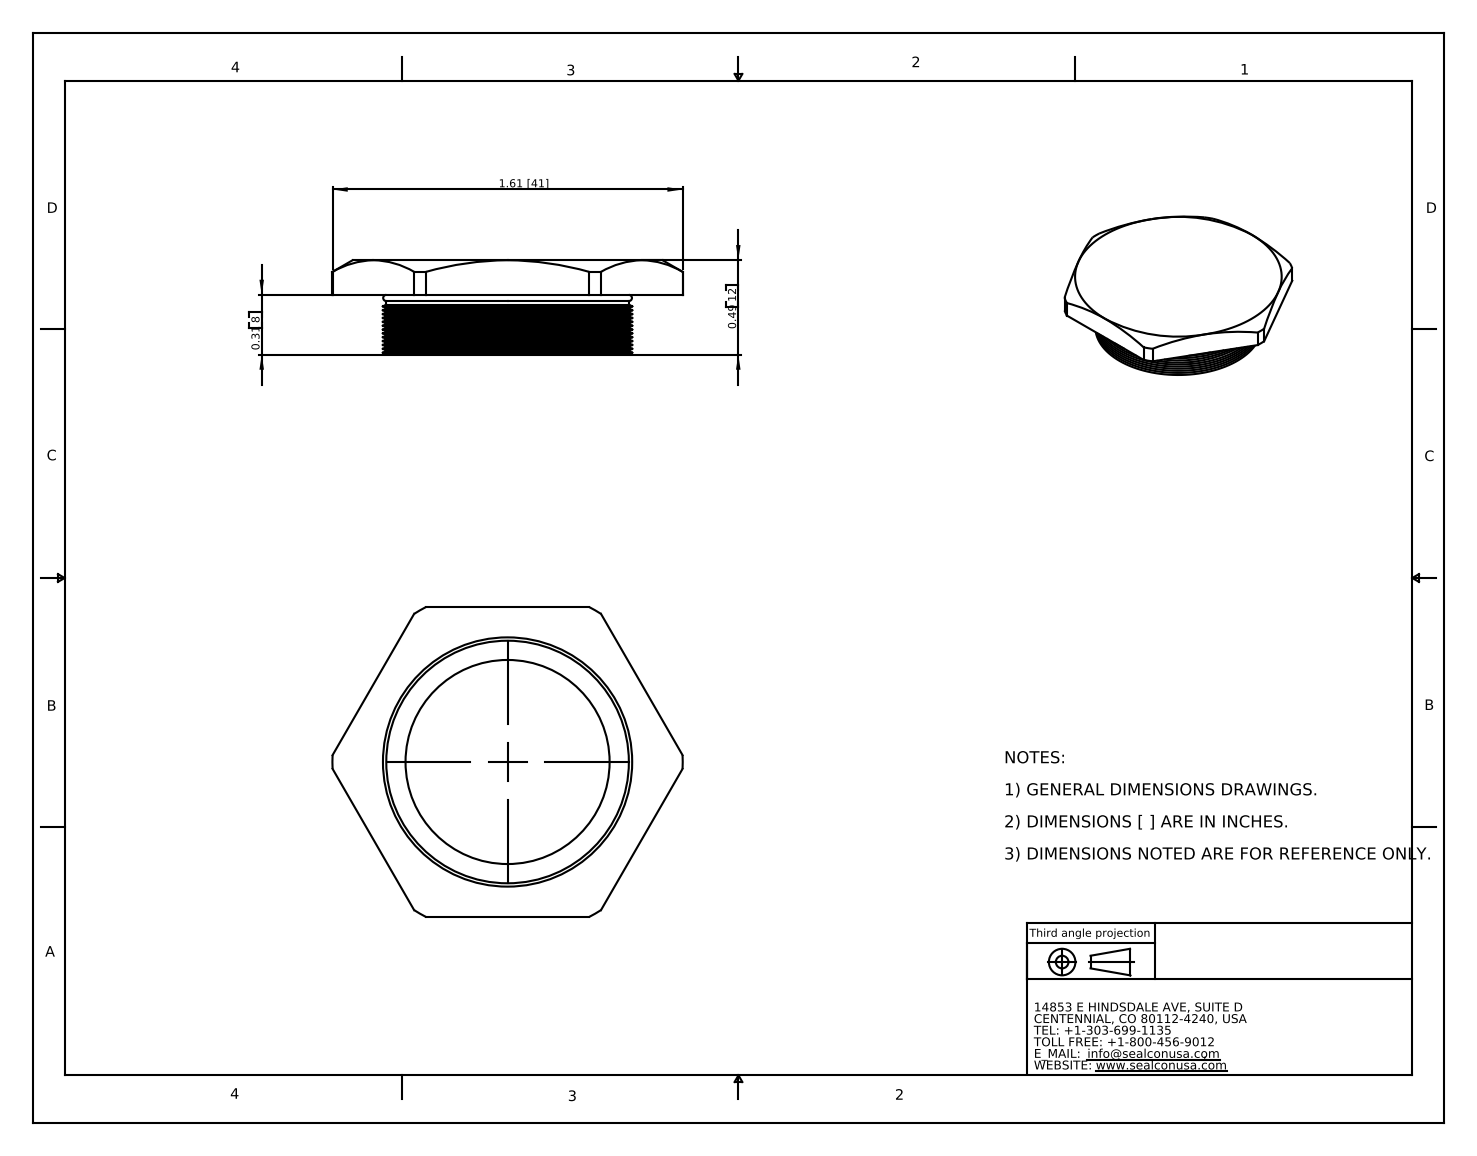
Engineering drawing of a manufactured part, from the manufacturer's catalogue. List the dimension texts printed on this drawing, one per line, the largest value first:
1.61 [41]
0.49 12
0.31 8
